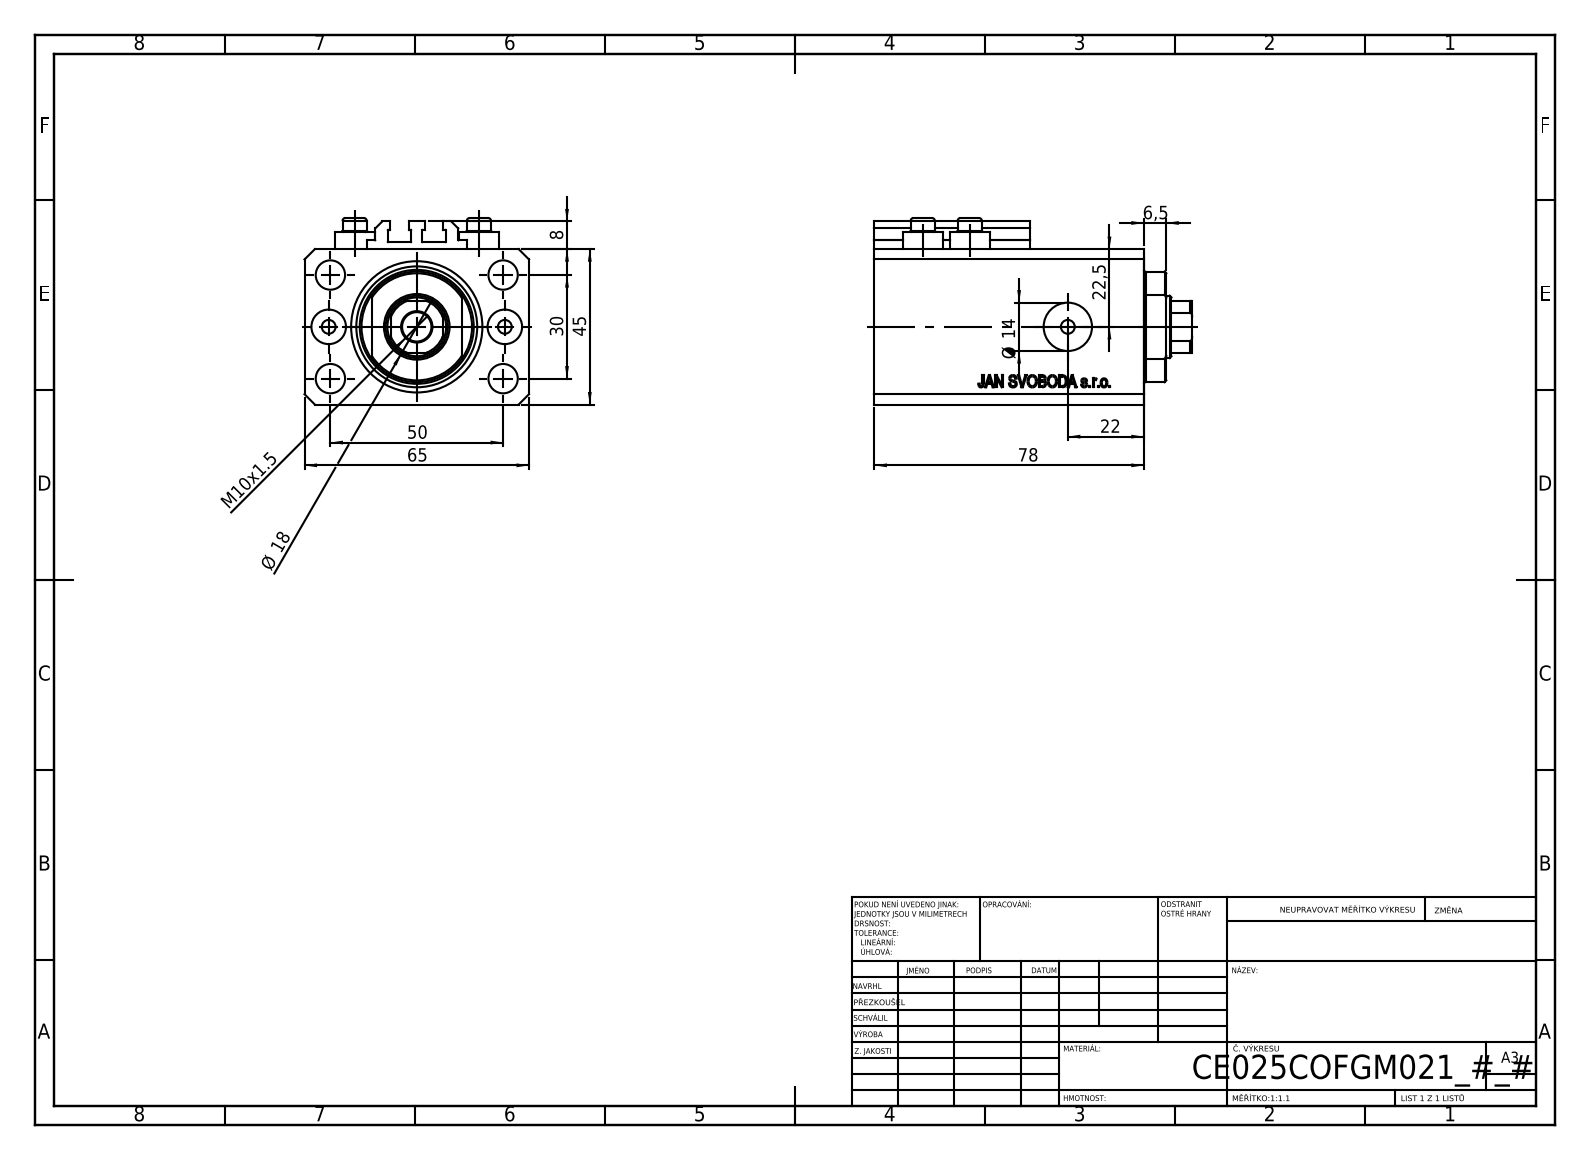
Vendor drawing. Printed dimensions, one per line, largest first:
78
65
50
45
30
22,5
22
Ø 18
Ø 14
M10x1.5
8
6,5
